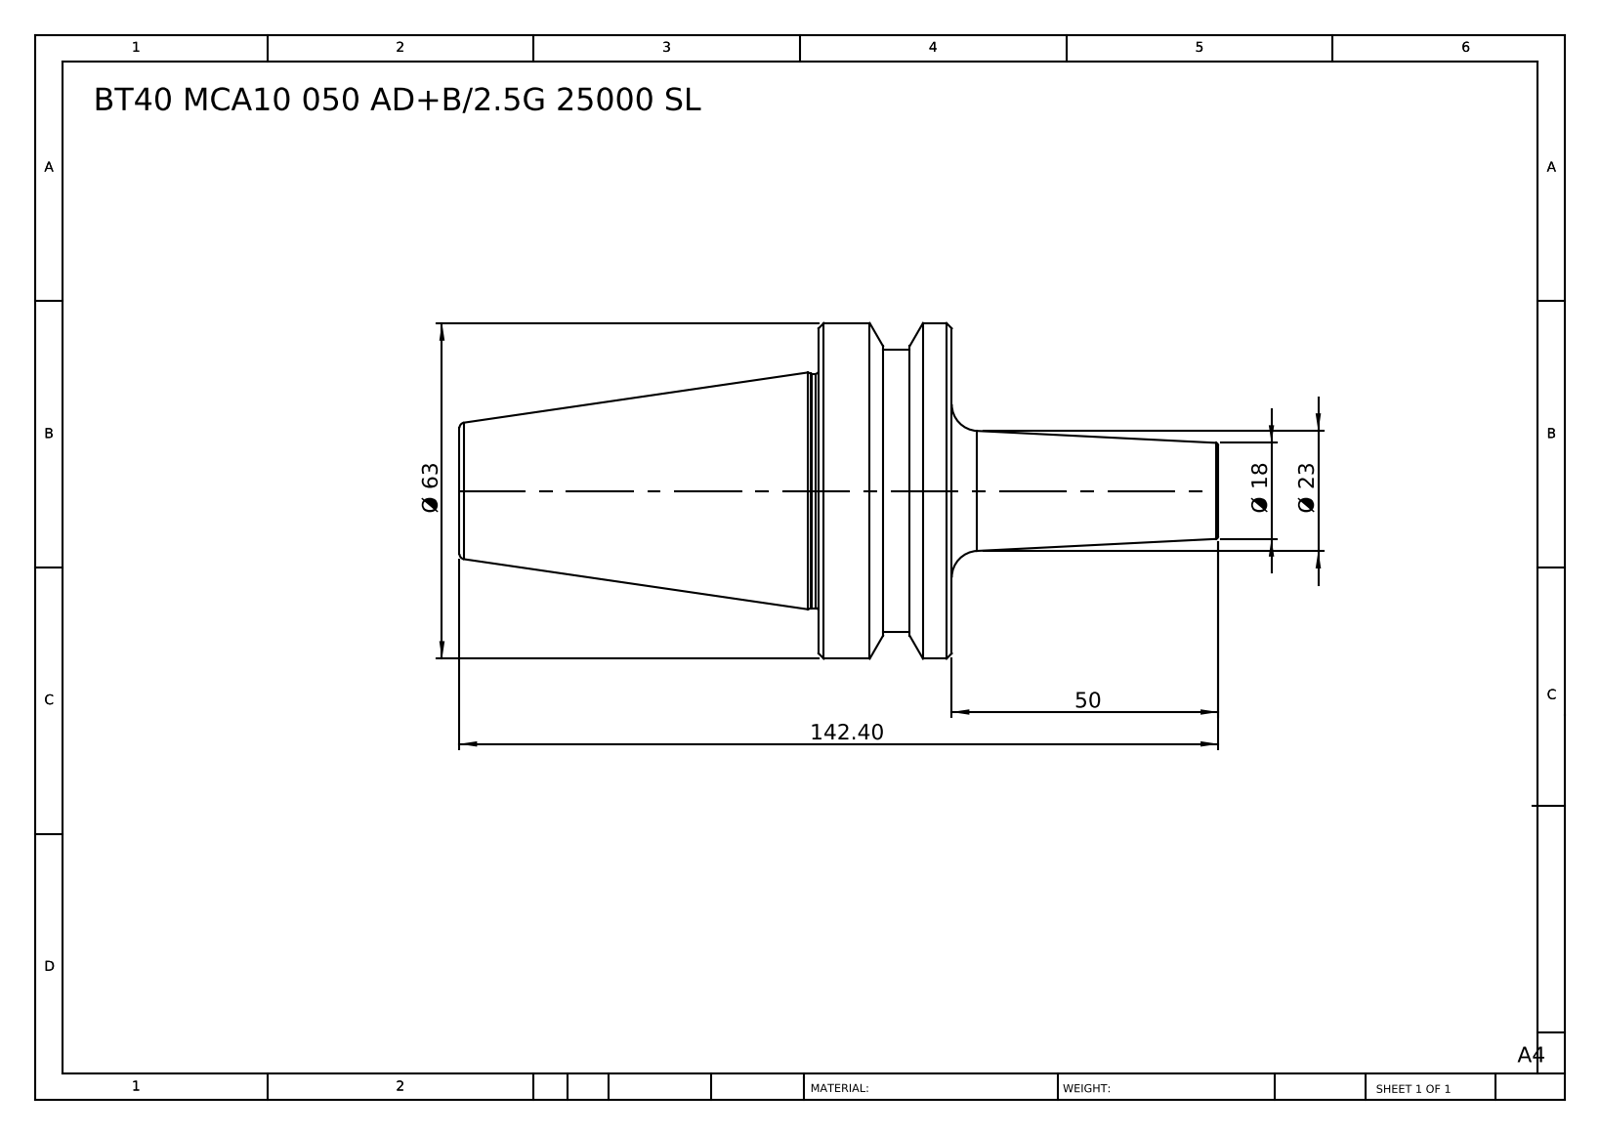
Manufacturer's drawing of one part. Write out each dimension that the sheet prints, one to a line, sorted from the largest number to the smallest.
142.40
Ø 63
50
Ø 23
Ø 18
